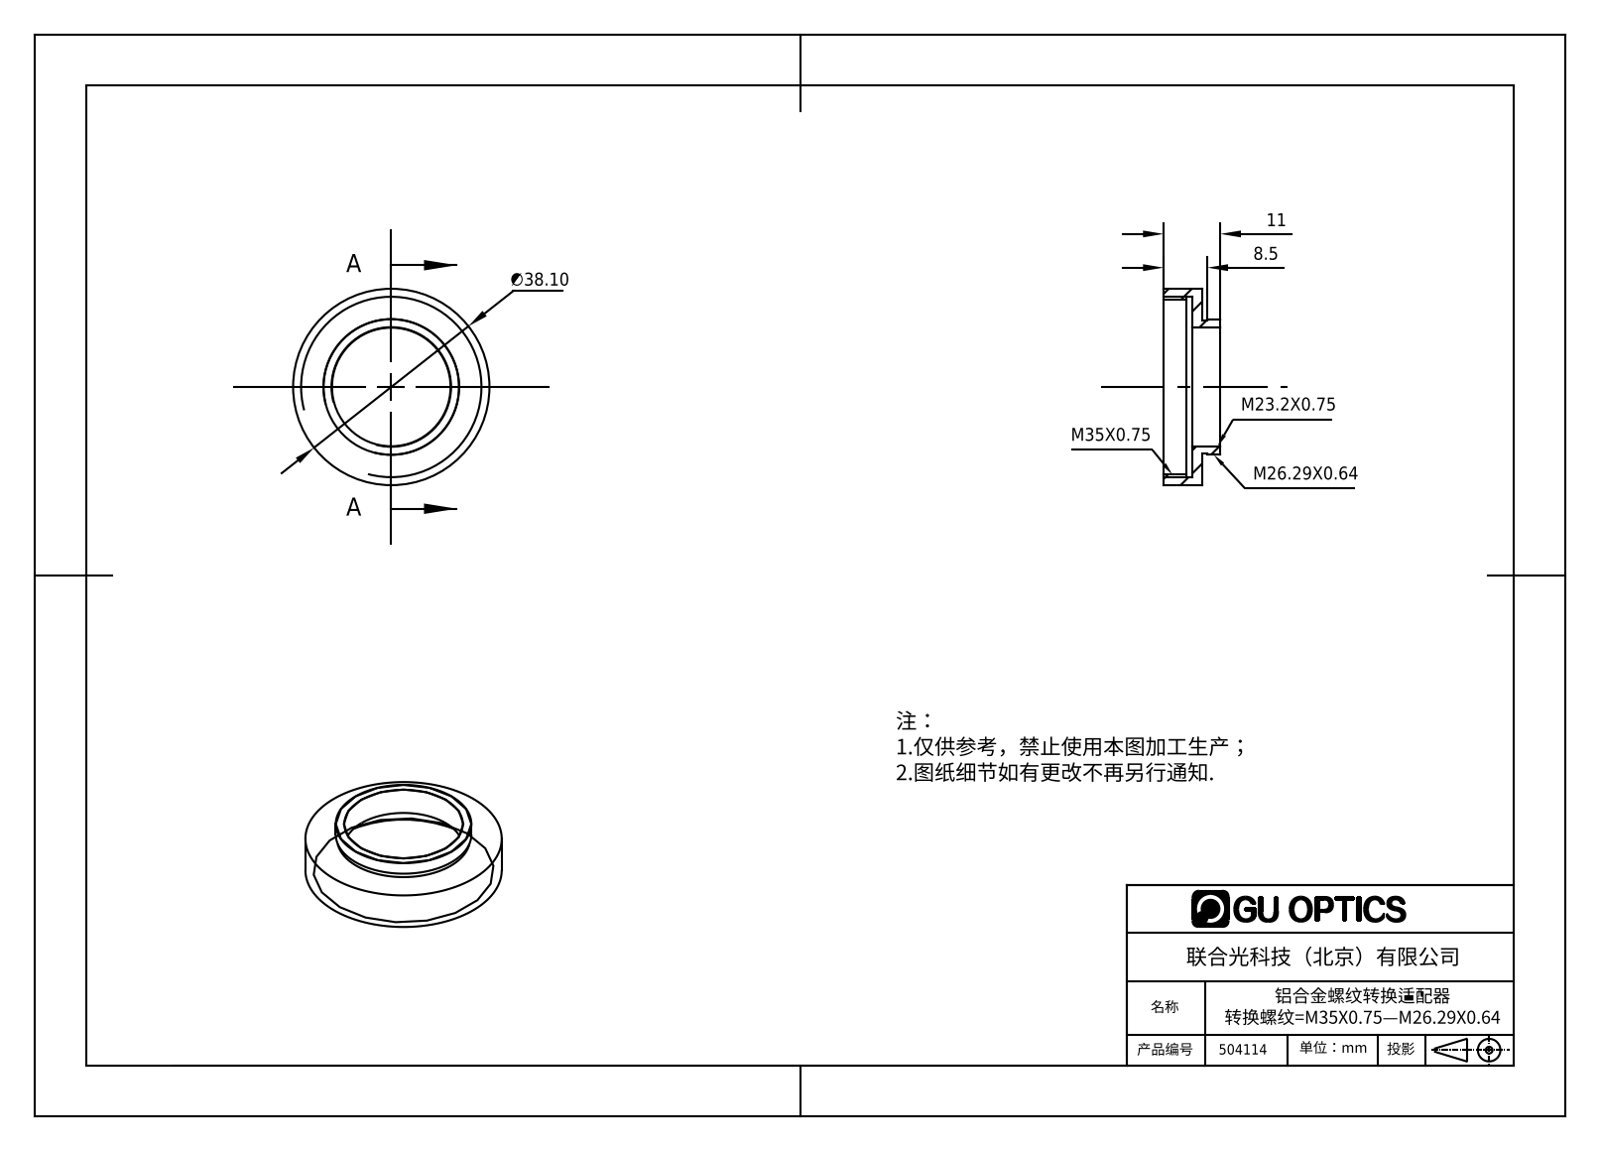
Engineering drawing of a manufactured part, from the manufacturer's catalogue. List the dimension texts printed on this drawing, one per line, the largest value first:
∅38.10
11
8.5
